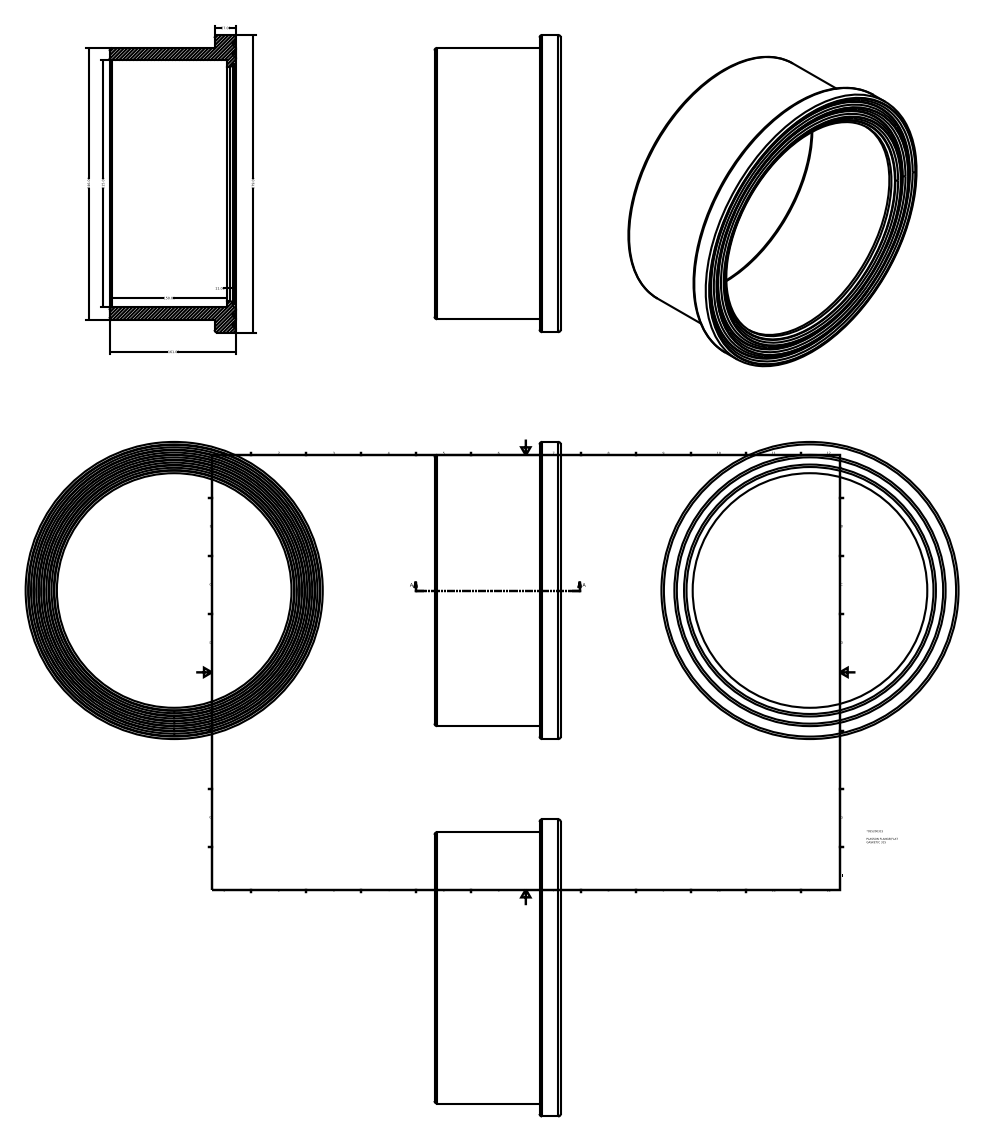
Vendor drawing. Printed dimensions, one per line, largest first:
379.00
346.00
315.00
161.00
150.00
27.00
11.00
